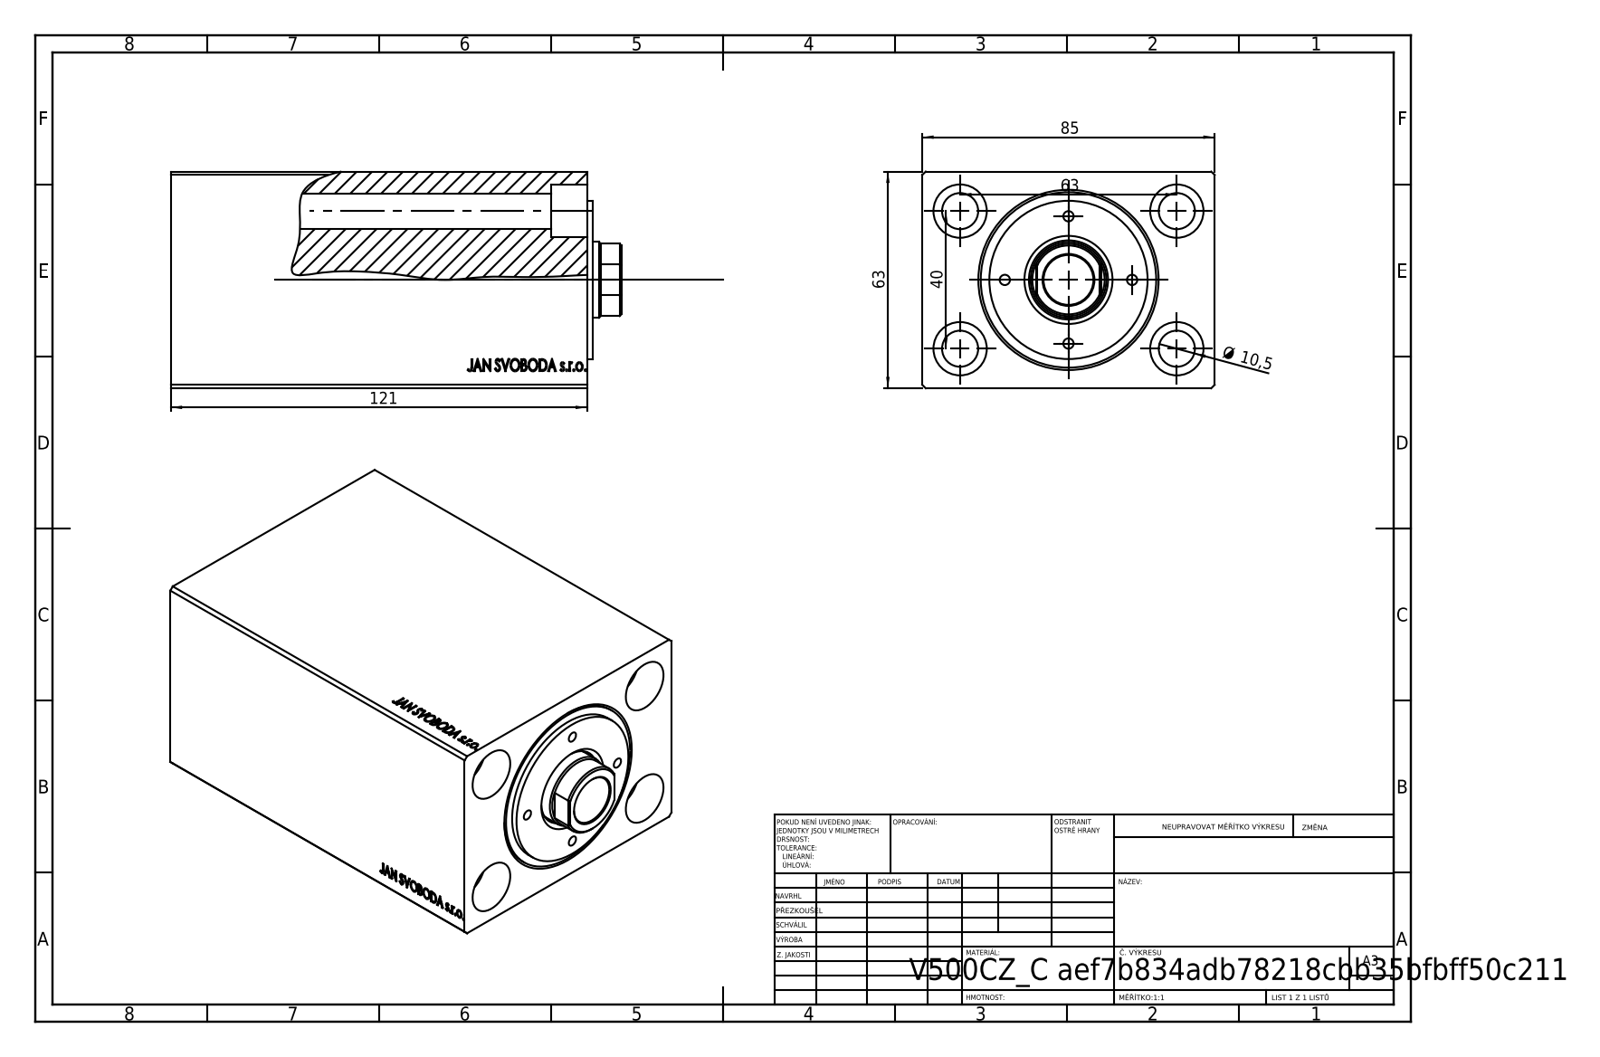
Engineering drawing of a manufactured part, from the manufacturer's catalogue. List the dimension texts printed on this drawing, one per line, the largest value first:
121
85
63
63
40
Ø 10,5
